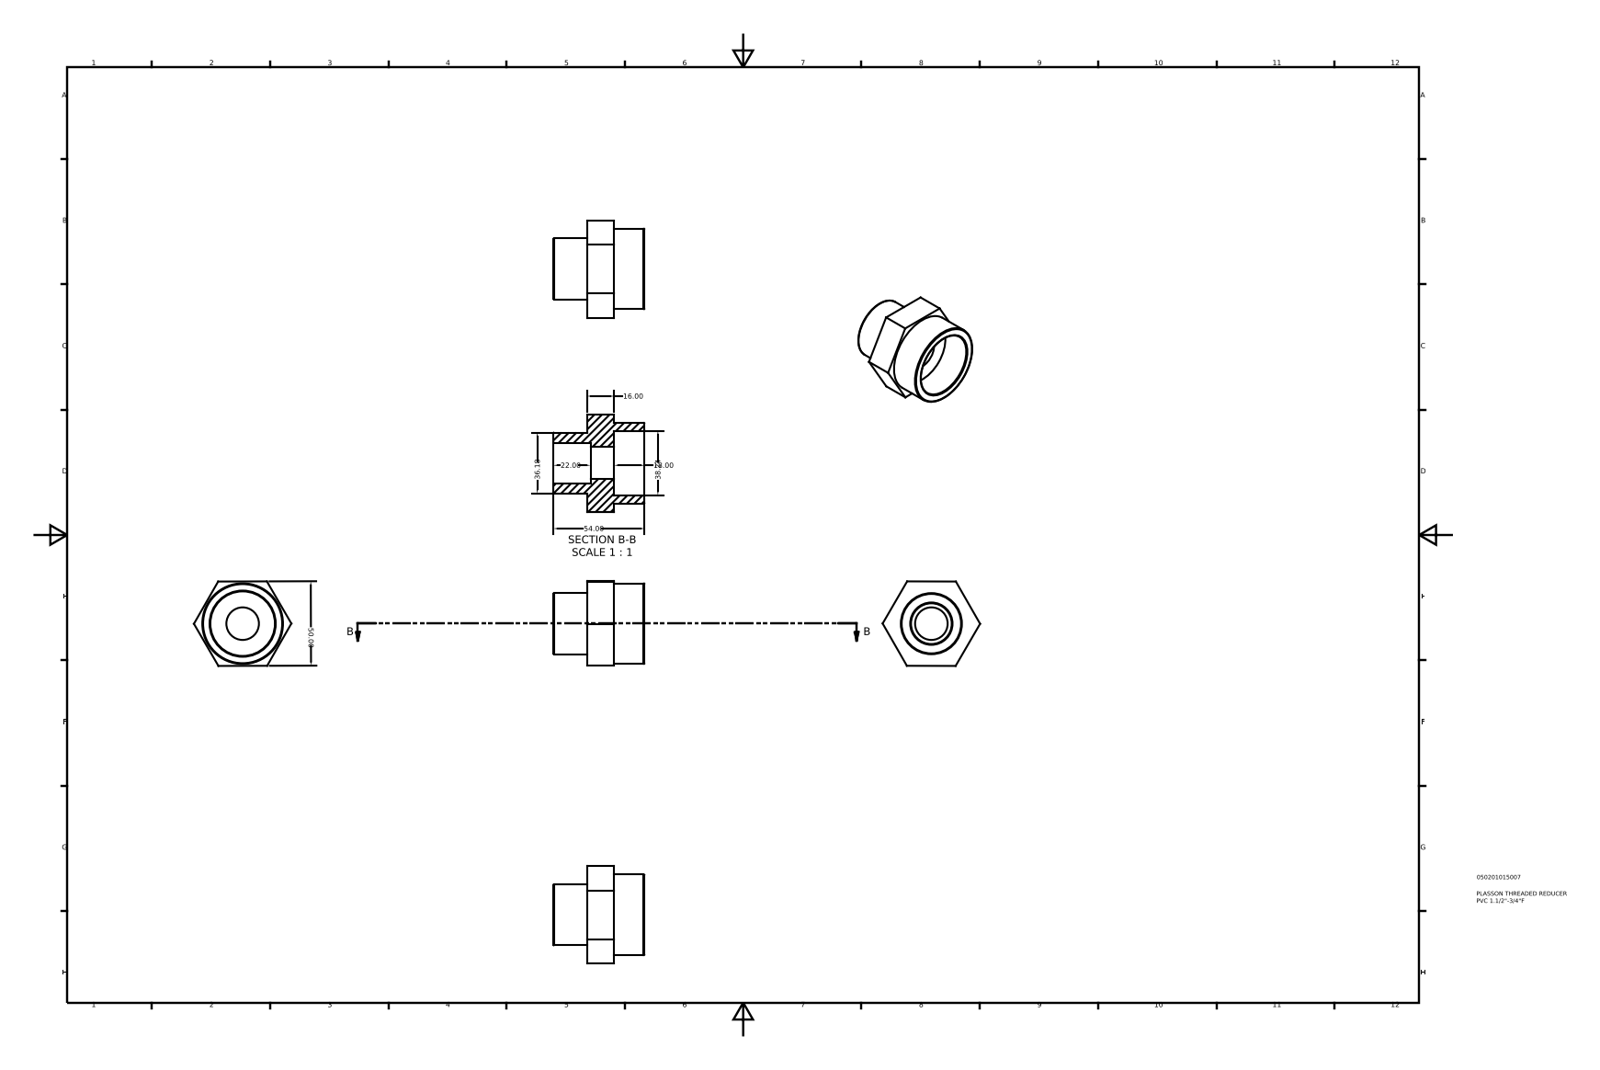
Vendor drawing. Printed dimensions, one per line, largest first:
54.00
50.00
38.24
36.18
22.00
18.00
16.00
